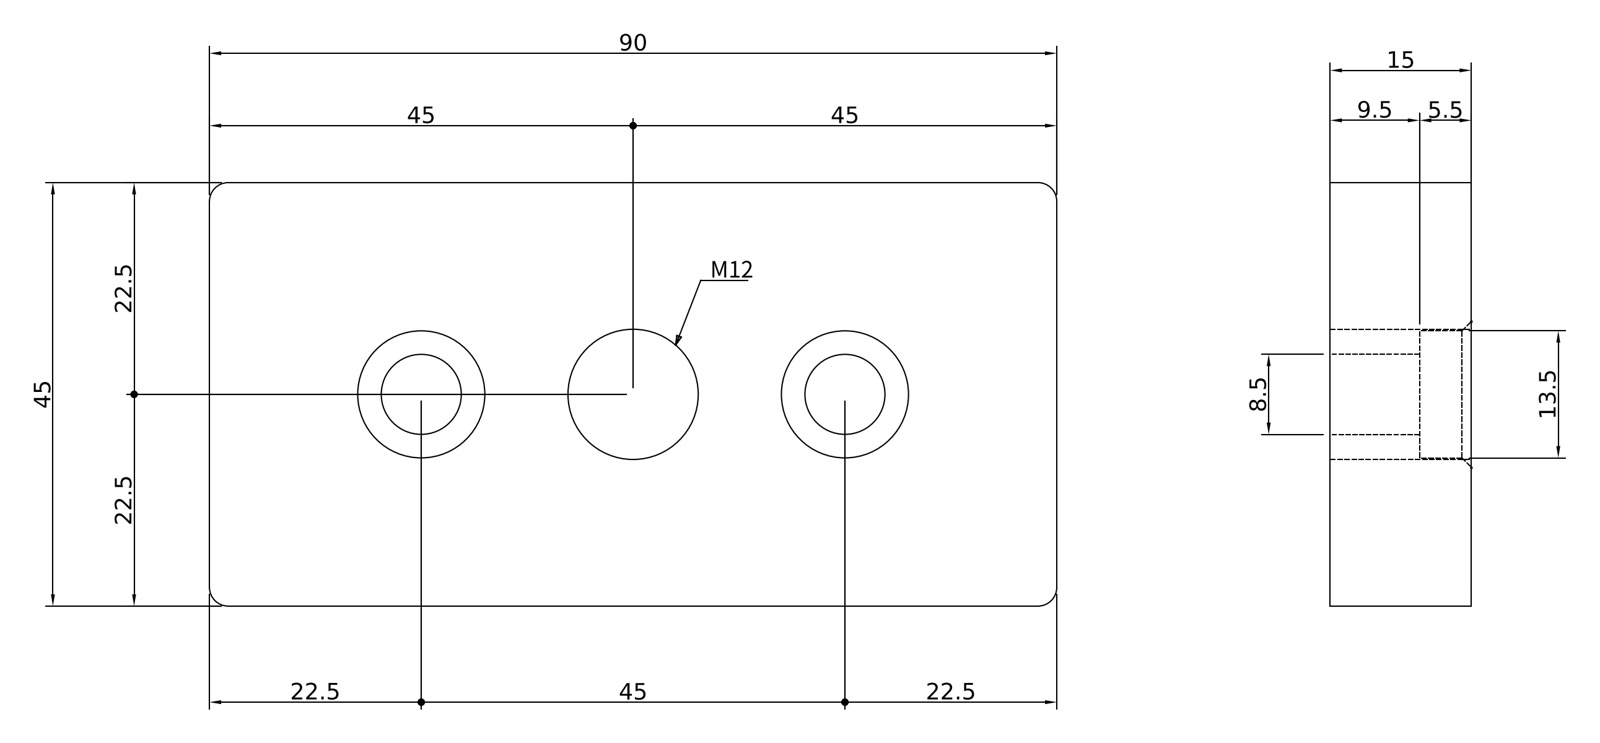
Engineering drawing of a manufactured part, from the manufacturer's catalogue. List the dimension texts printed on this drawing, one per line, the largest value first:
90
45
45
45
45
22.5
22.5
22.5
22.5
15
13.5
9.5
8.5
5.5
